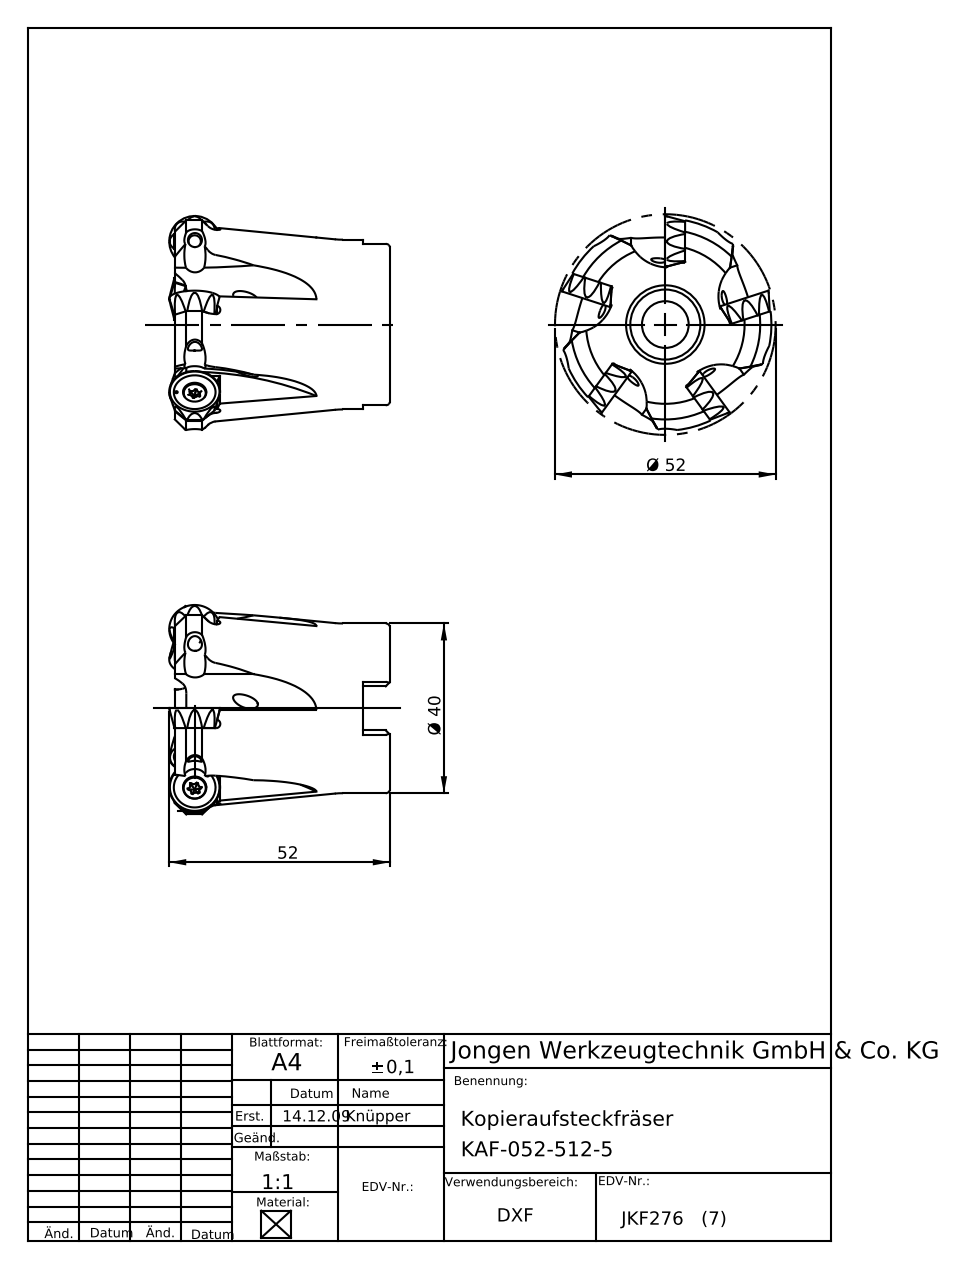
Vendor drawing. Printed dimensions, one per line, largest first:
52
Ø 52
Ø 40
